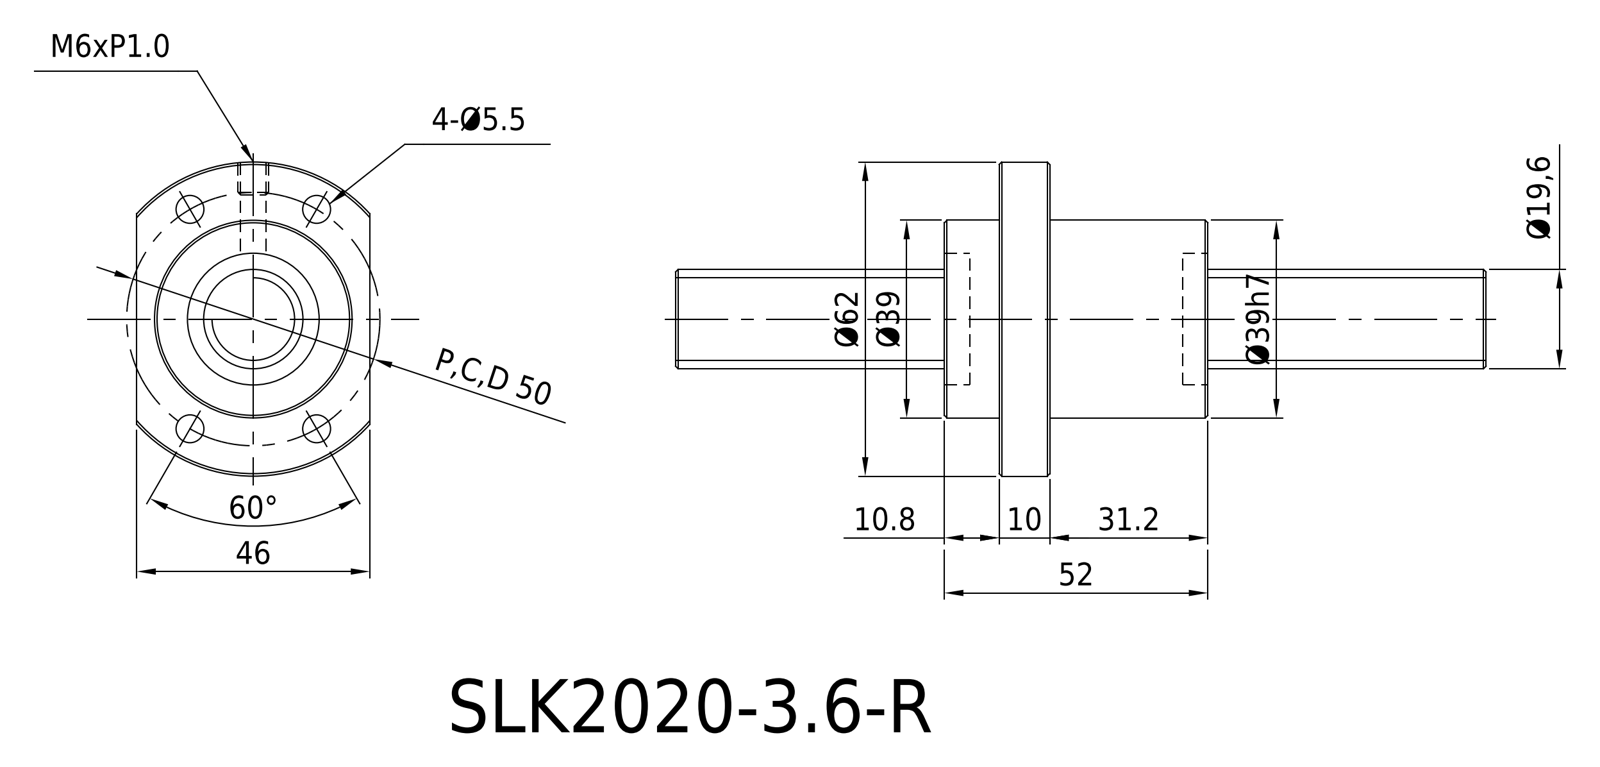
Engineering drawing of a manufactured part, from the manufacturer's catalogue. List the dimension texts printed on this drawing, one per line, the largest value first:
Ø62
60°
52
P,C,D 50
46
Ø39h7
Ø39
31.2
Ø19,6
10.8
10
